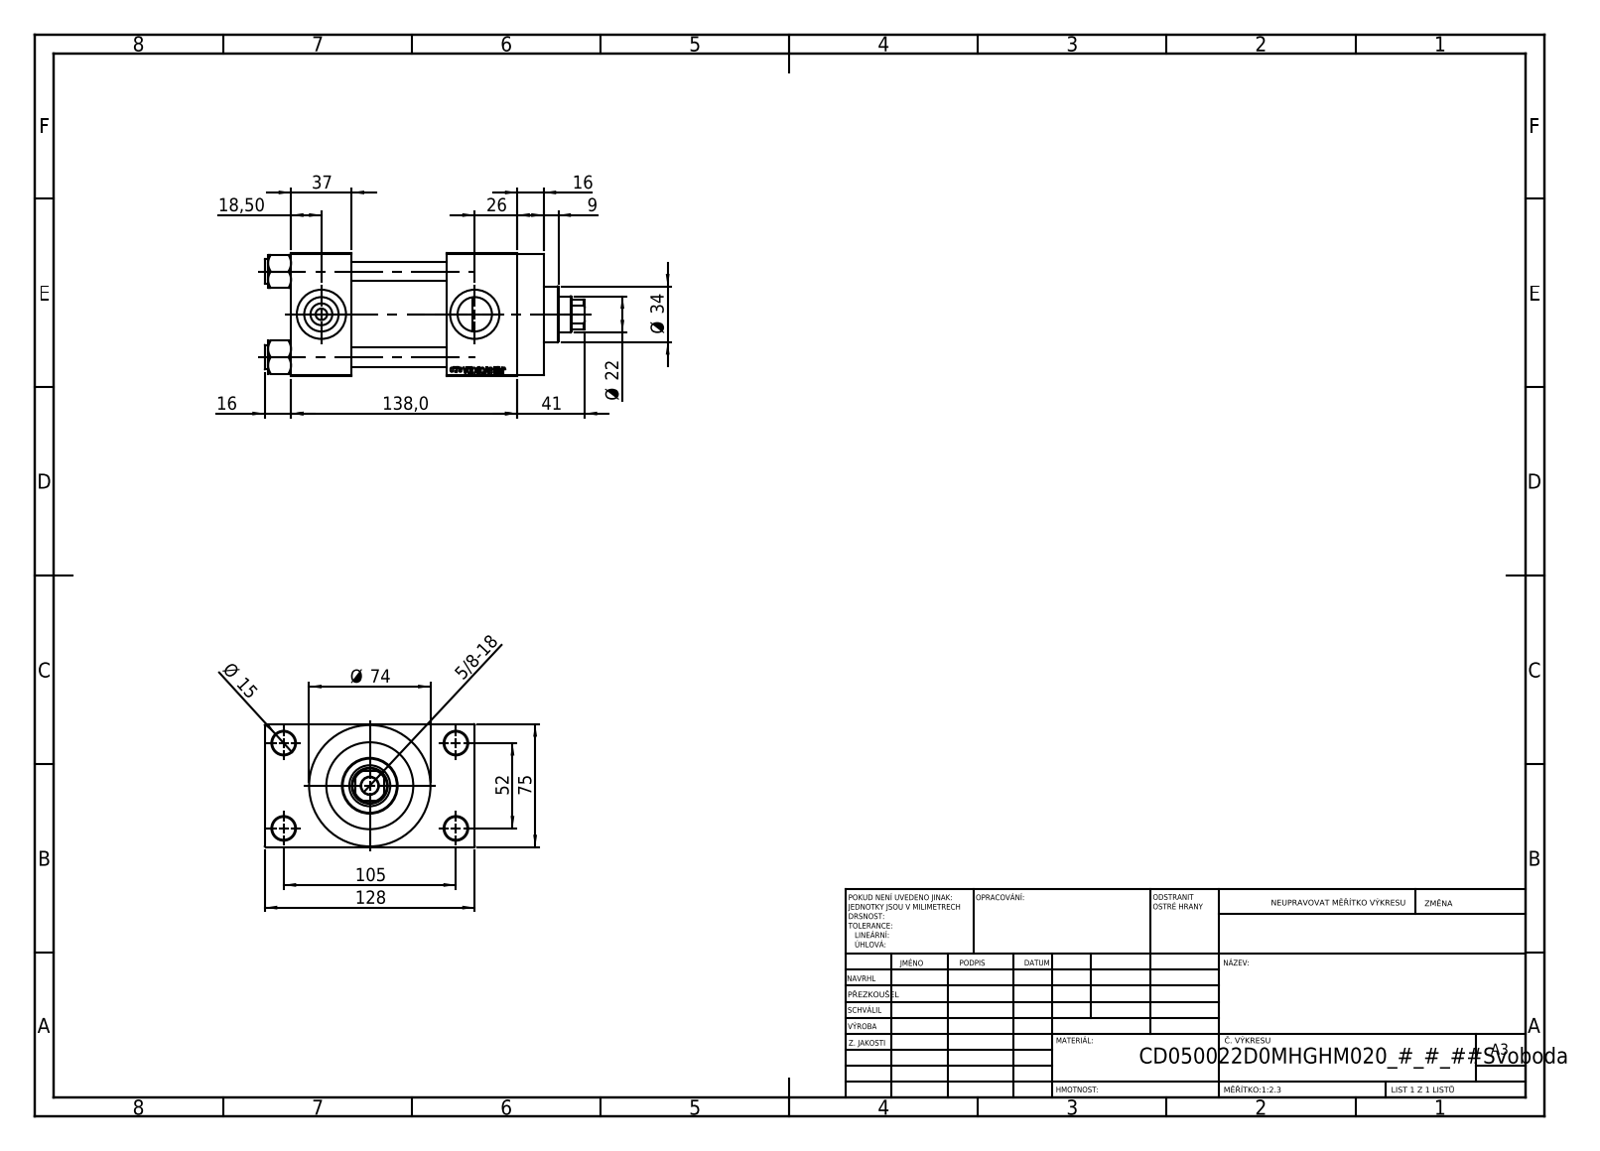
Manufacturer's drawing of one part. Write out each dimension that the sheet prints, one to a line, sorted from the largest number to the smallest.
138,0
128
105
75
Ø 74
52
41
37
Ø 34
26
Ø 22
18,50
16
16
Ø 15
9
5/8-18
